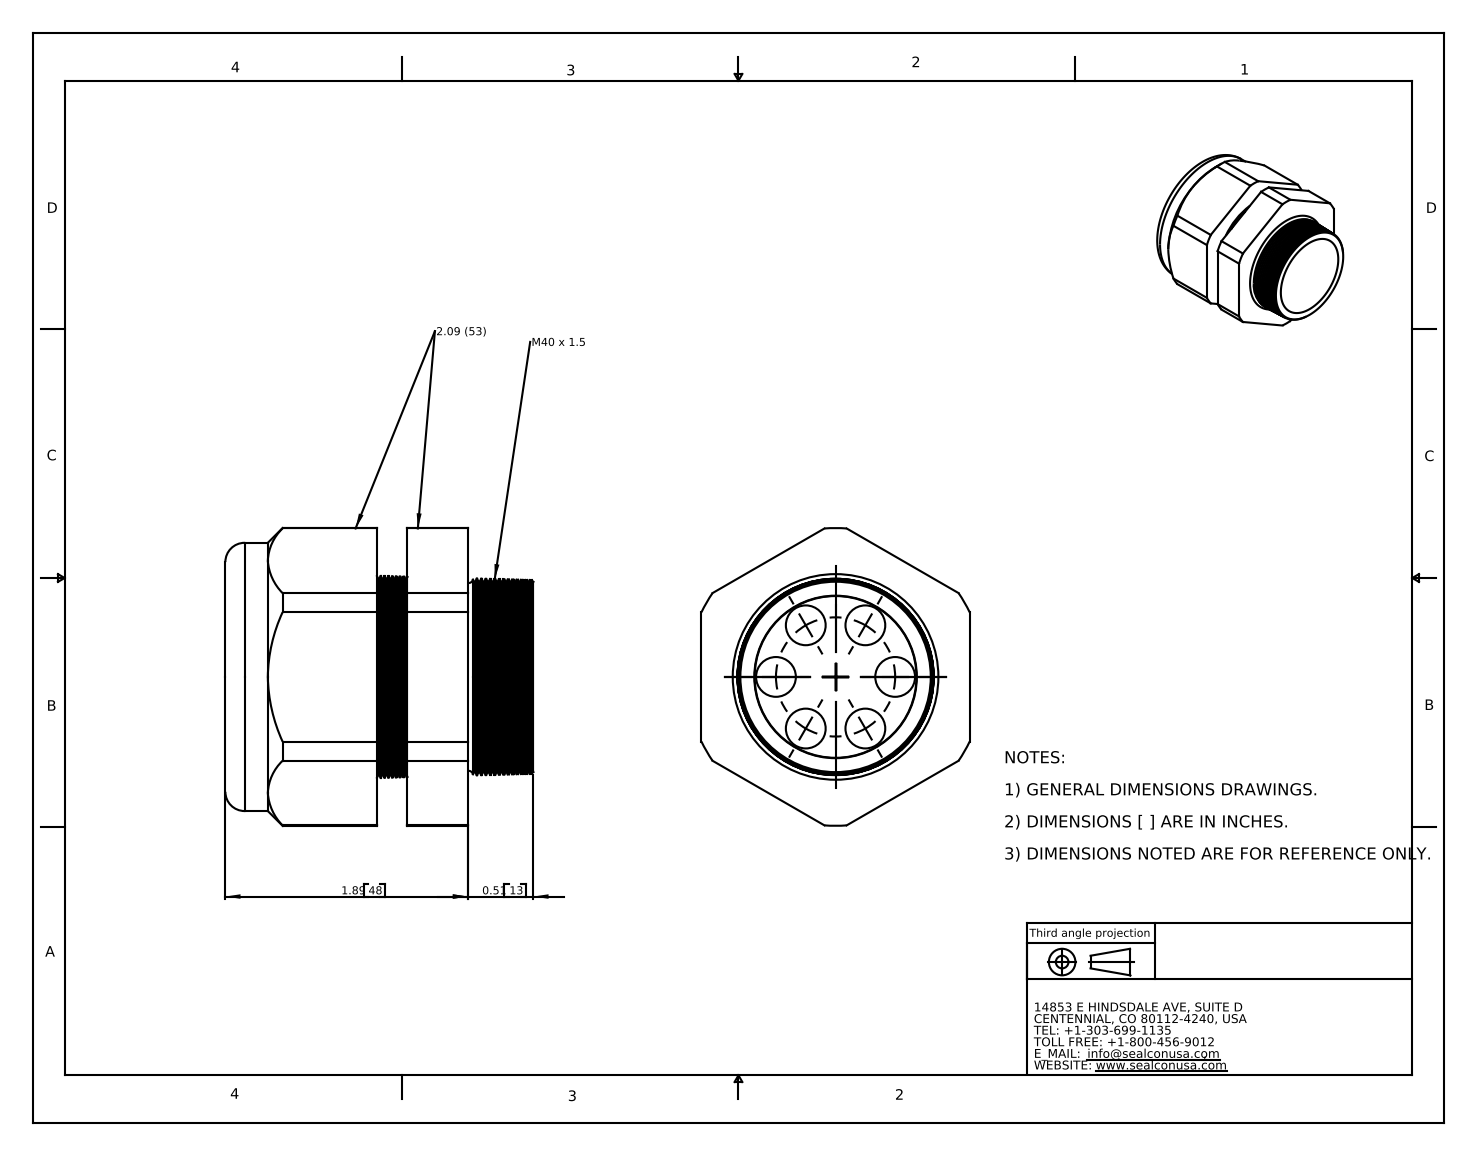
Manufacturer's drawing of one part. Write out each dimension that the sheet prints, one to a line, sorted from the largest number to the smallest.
1.89 48
0.51 13
